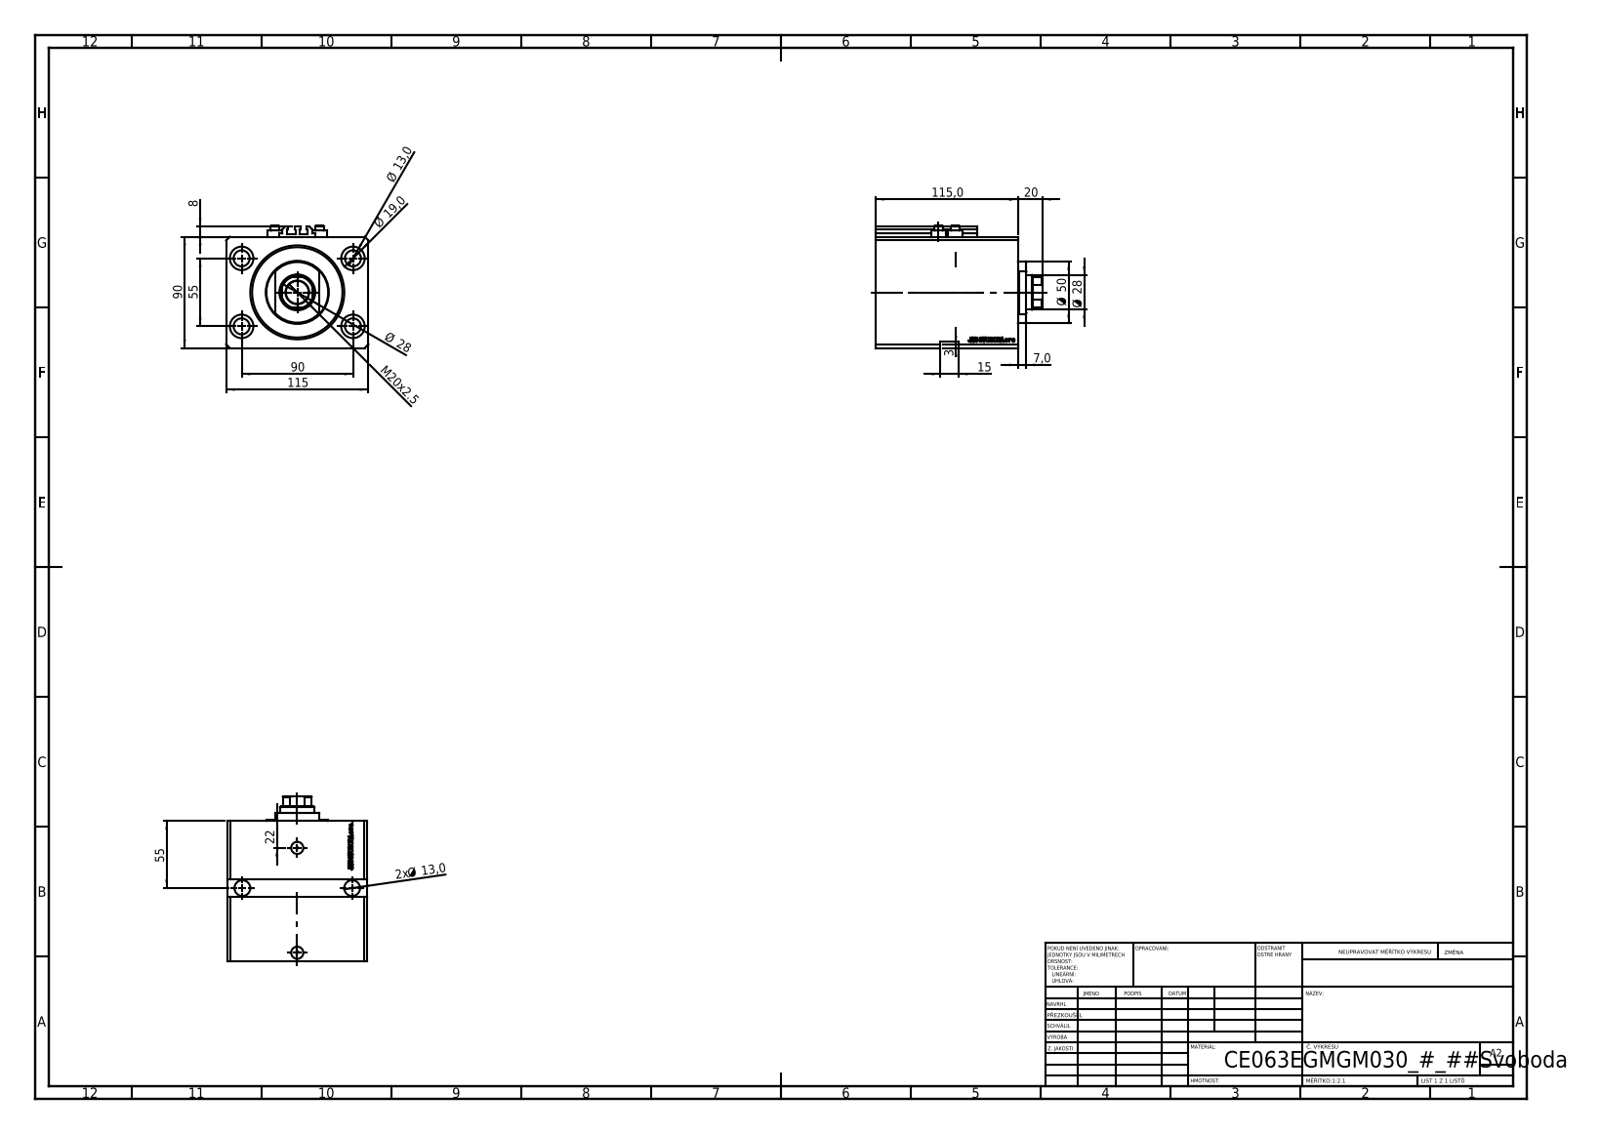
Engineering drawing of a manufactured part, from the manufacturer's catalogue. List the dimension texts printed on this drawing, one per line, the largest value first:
115
115,0
90
90
55
55
Ø 50
Ø 28
Ø 28
22
M20x2.5
20
Ø 19,0
15
Ø 13,0
2x Ø 13,0
8
7,0
3
